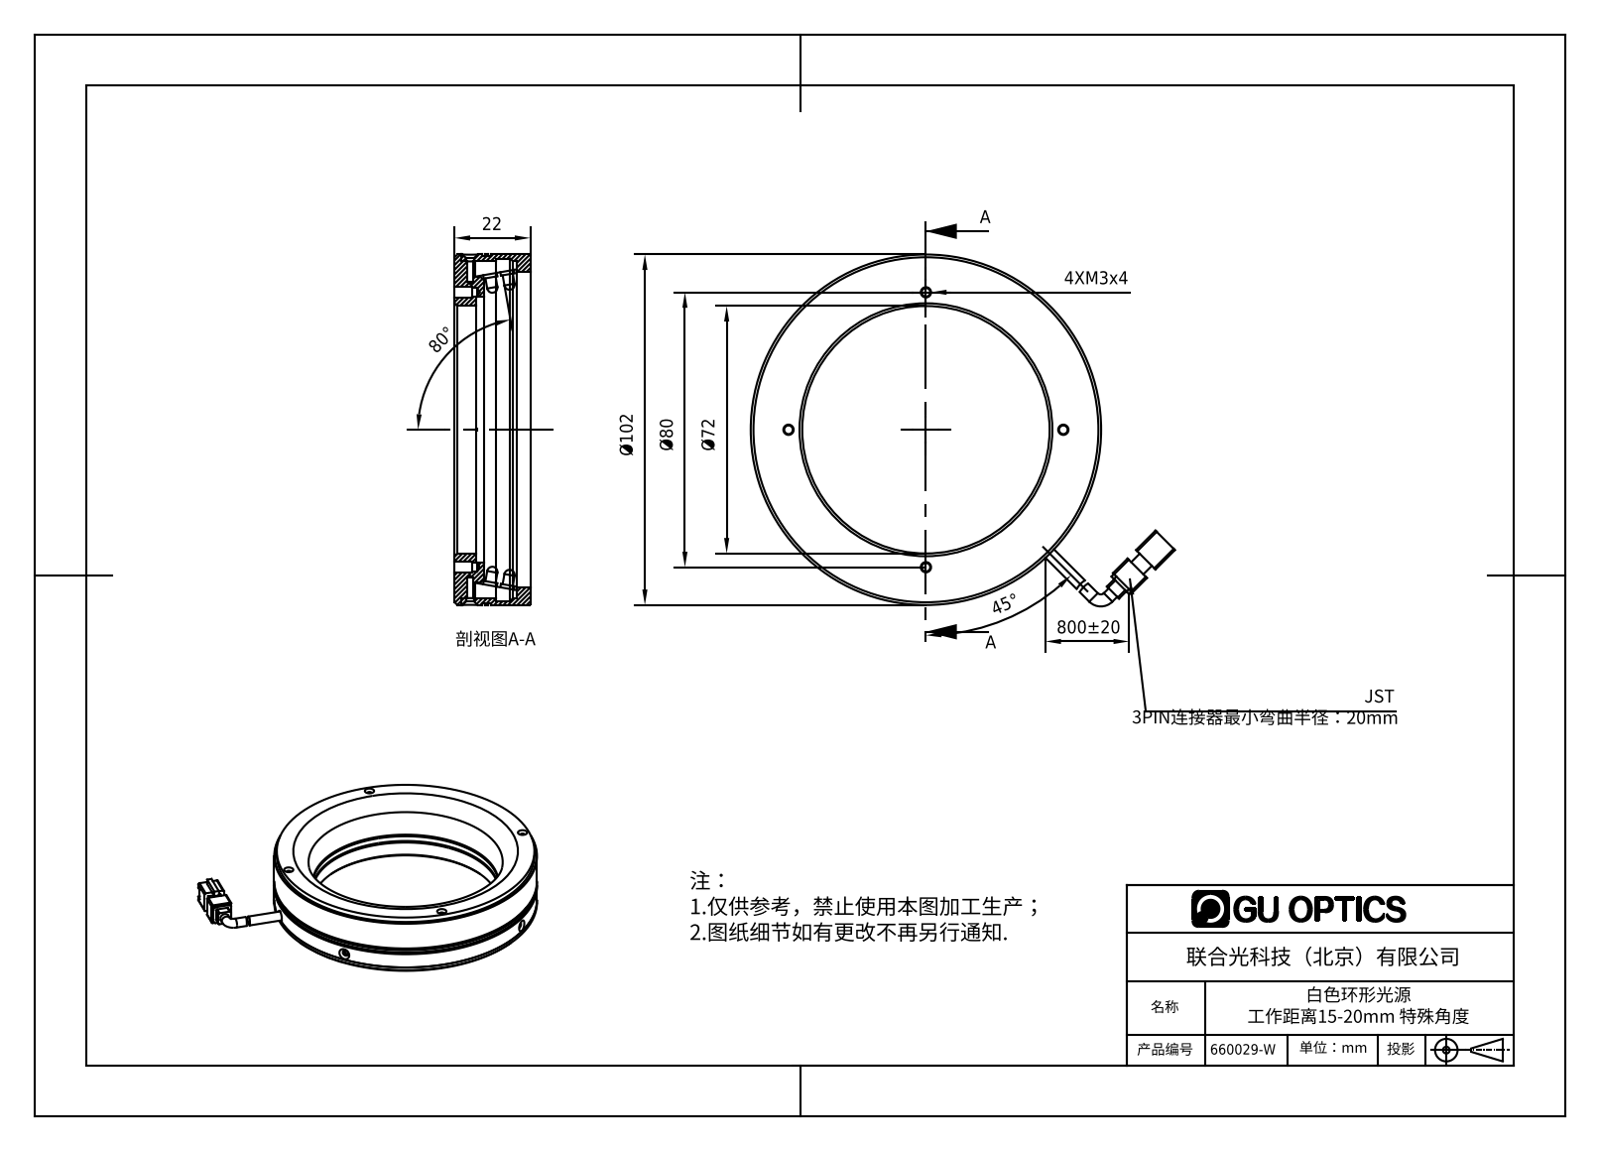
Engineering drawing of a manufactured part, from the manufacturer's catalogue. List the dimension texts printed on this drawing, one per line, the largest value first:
800±20
Ø102
Ø80
80°
Ø72
45°
22
4XM3x4
